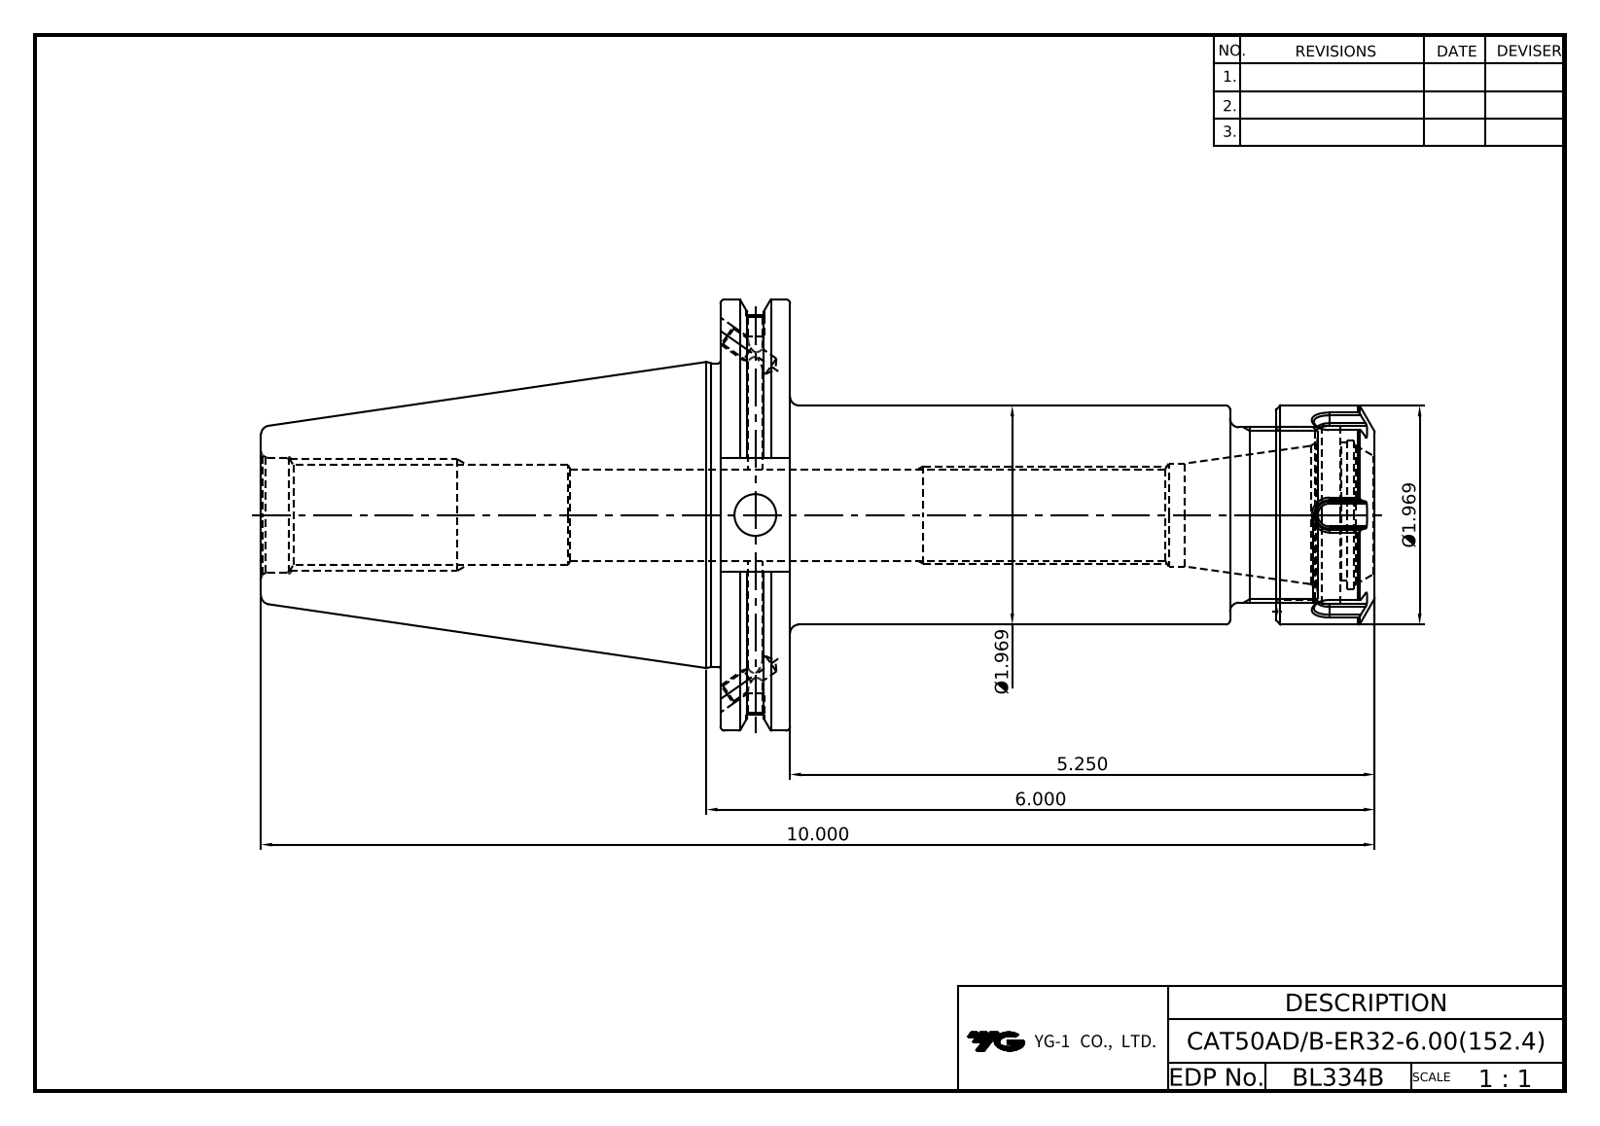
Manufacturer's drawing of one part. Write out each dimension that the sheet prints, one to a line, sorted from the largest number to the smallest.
10.000
6.000
5.250
Ø1.969
Ø1.969
